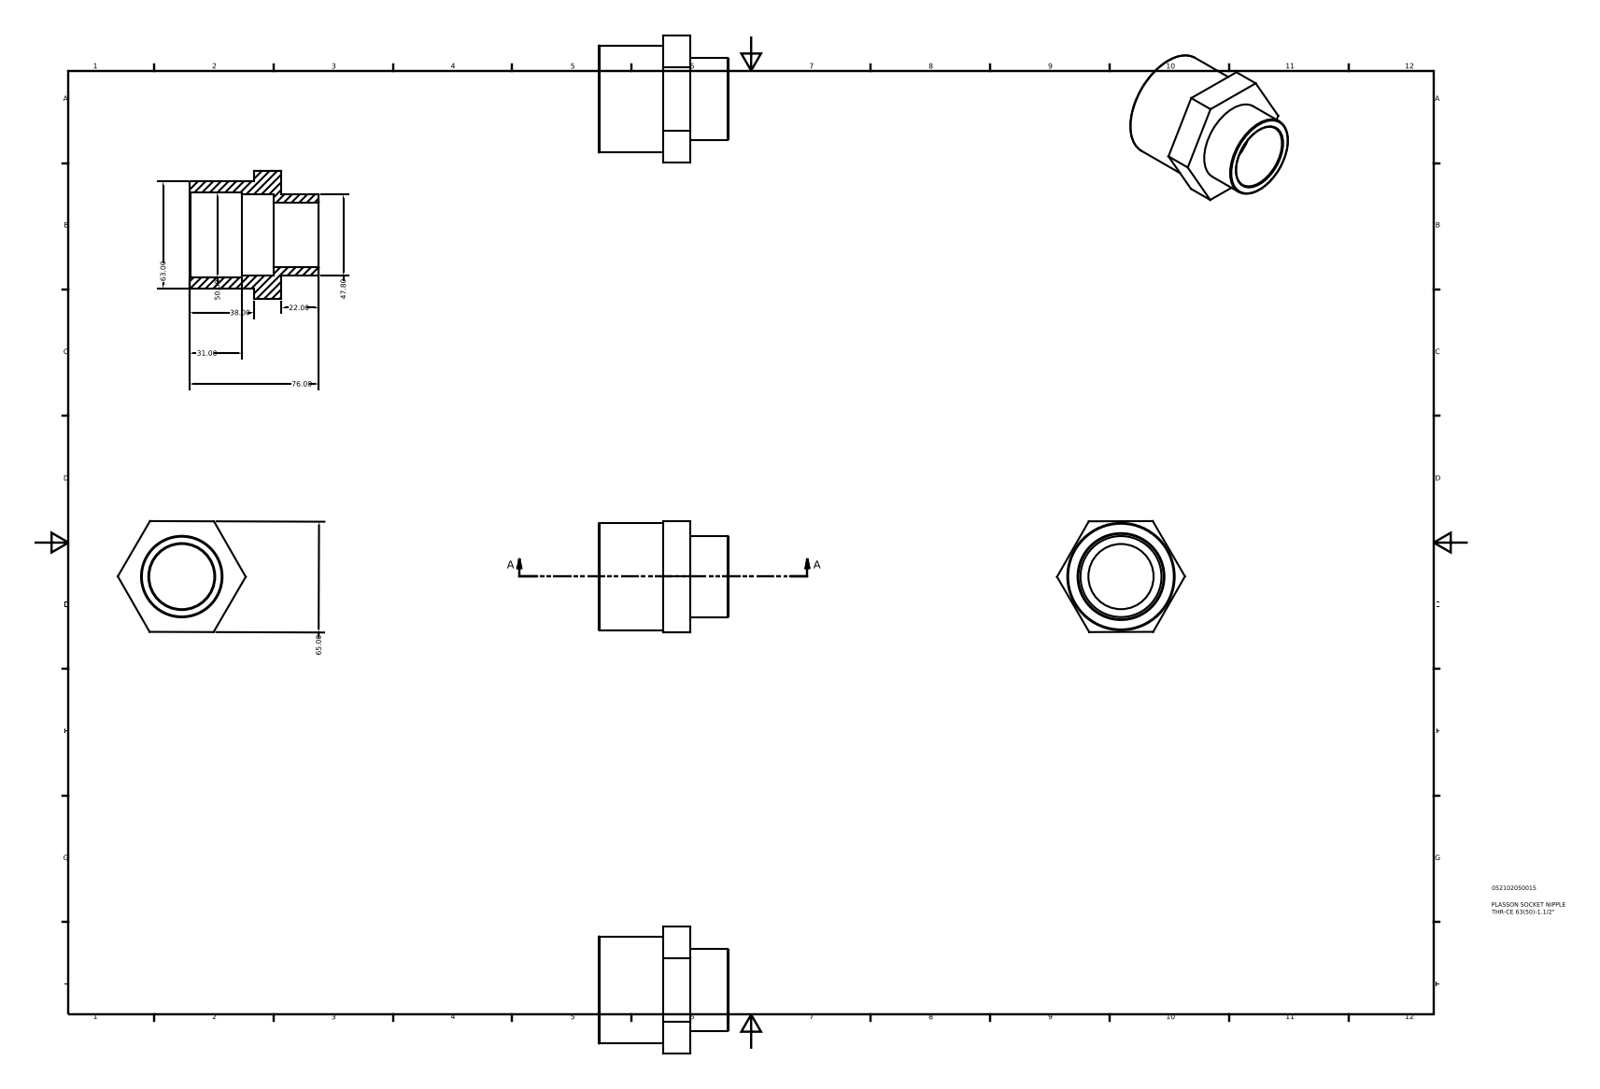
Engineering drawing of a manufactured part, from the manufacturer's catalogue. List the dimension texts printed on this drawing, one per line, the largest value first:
76.00
65.00
63.00
50.00
47.80
38.00
31.00
22.00
